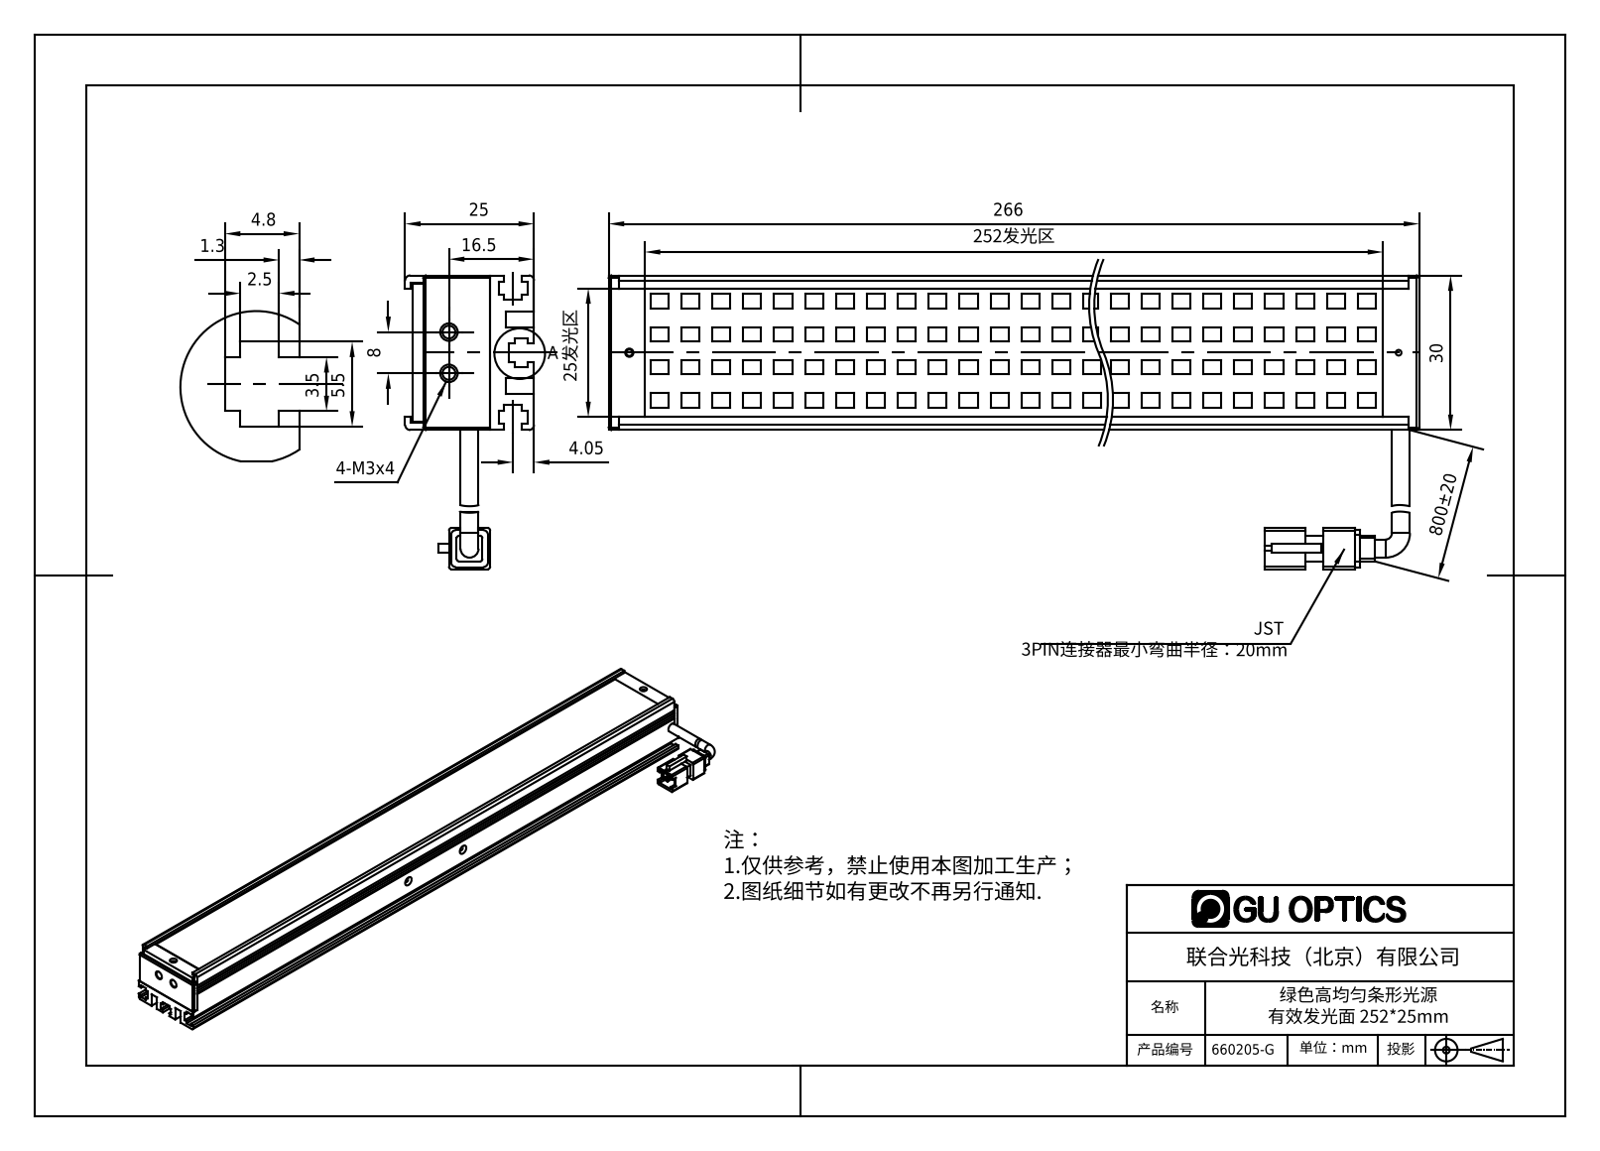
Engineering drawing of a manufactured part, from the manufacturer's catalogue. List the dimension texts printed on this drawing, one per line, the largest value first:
800±20
266
252发光区
30
25发光区
25
16.5
8
5.5
4.8
4.05
3.5
2.5
1.3
